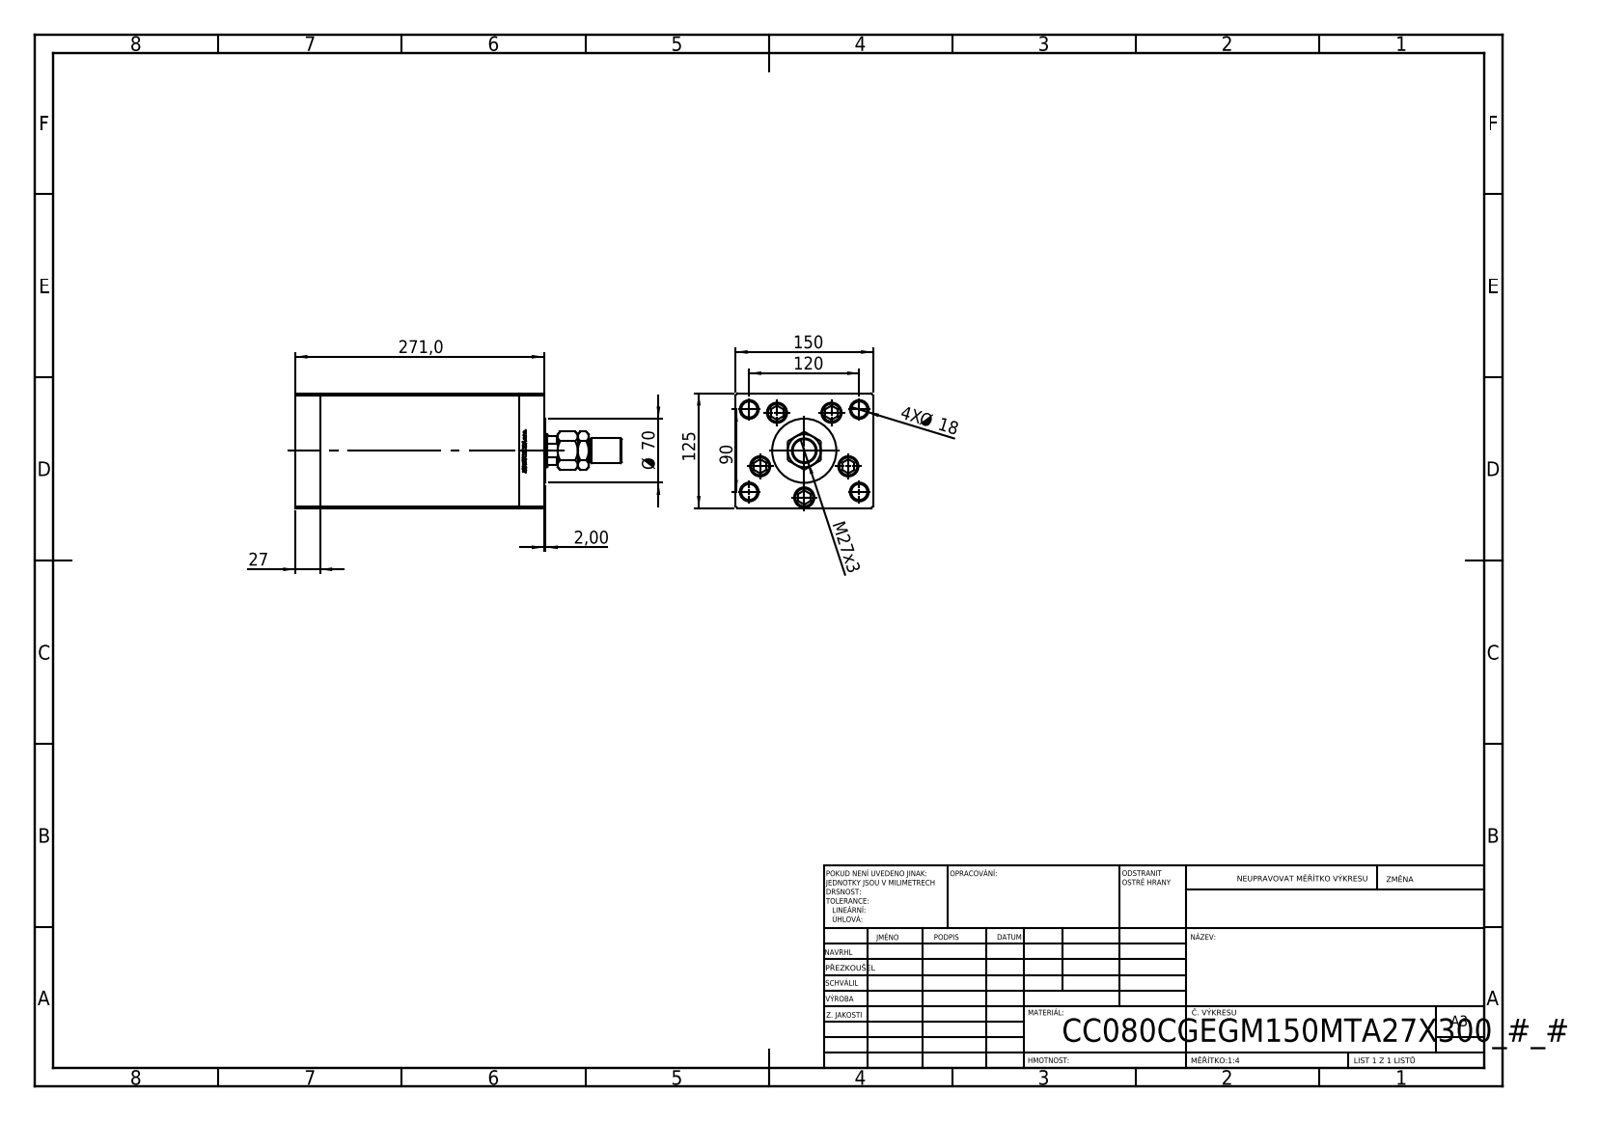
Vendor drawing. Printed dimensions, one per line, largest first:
271,0
150
125
120
90
Ø 70
27
M27x3
4X Ø 18
2,00
